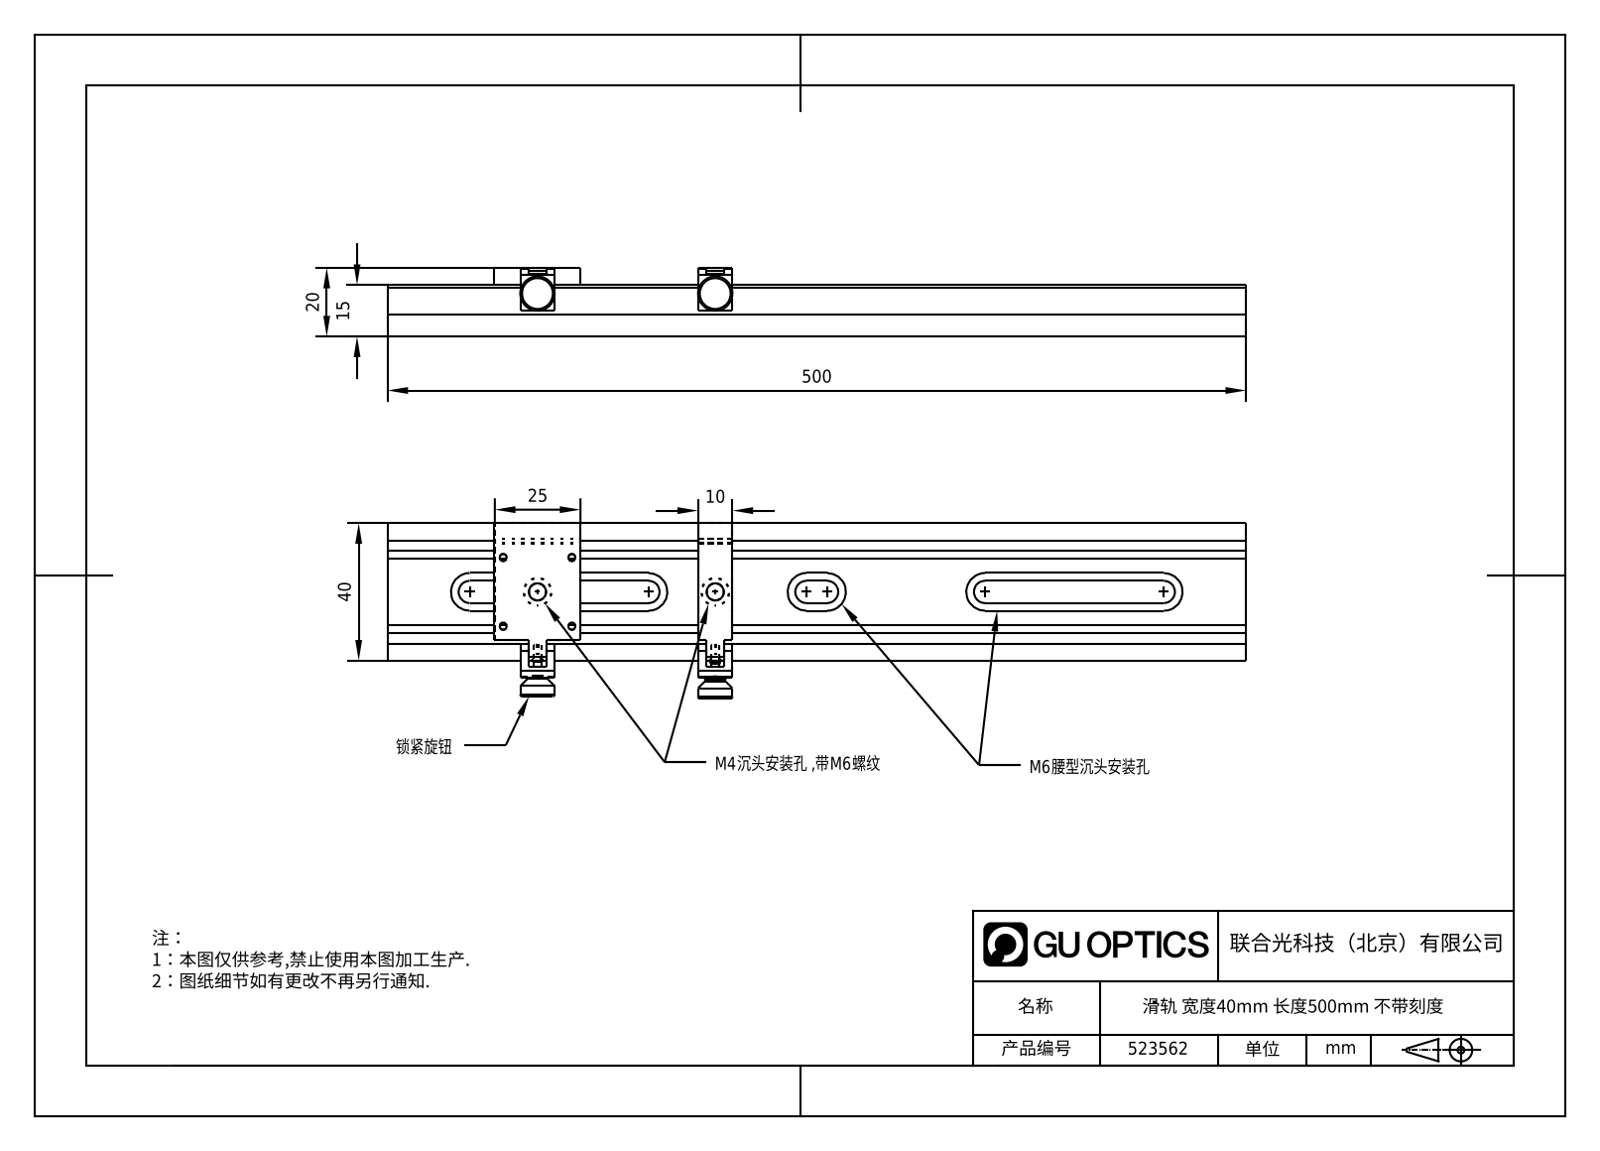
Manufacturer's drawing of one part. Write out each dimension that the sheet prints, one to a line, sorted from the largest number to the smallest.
500
40
25
20
15
10
